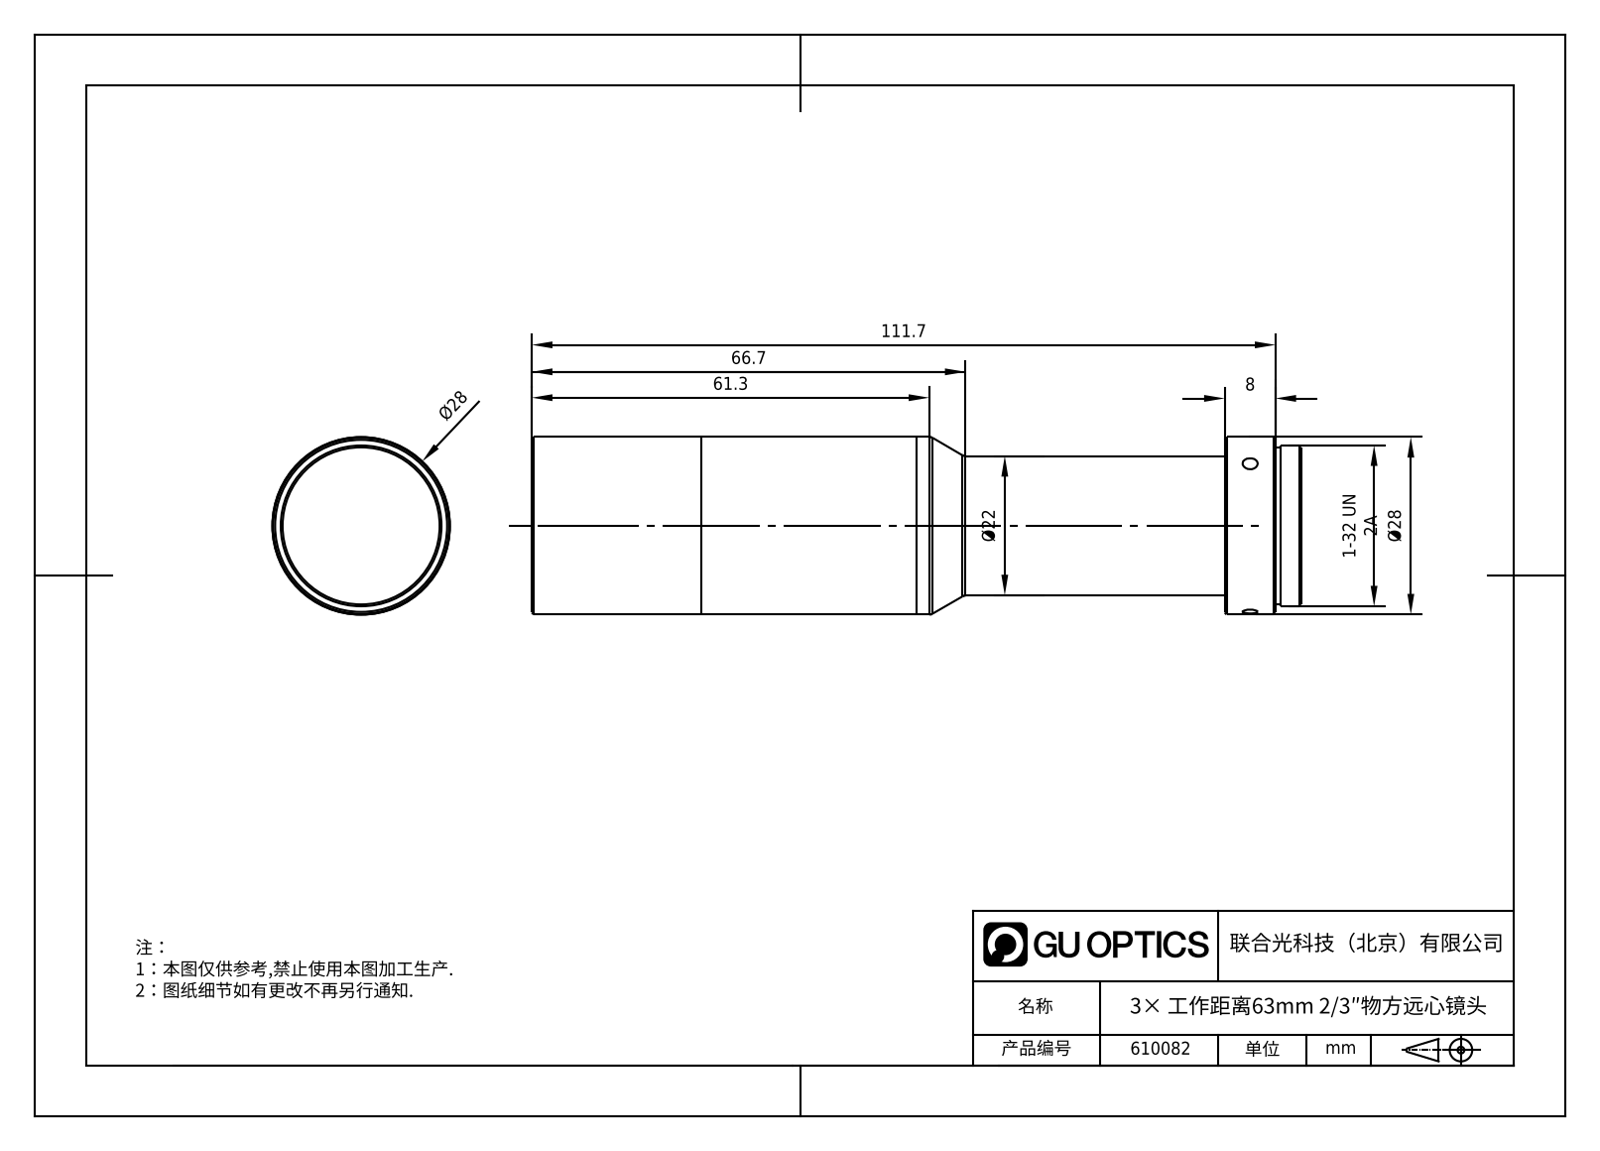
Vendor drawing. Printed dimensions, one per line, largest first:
111.7
66.7
61.3
Ø28
Ø28
Ø22
8
1-32 UN 2A
